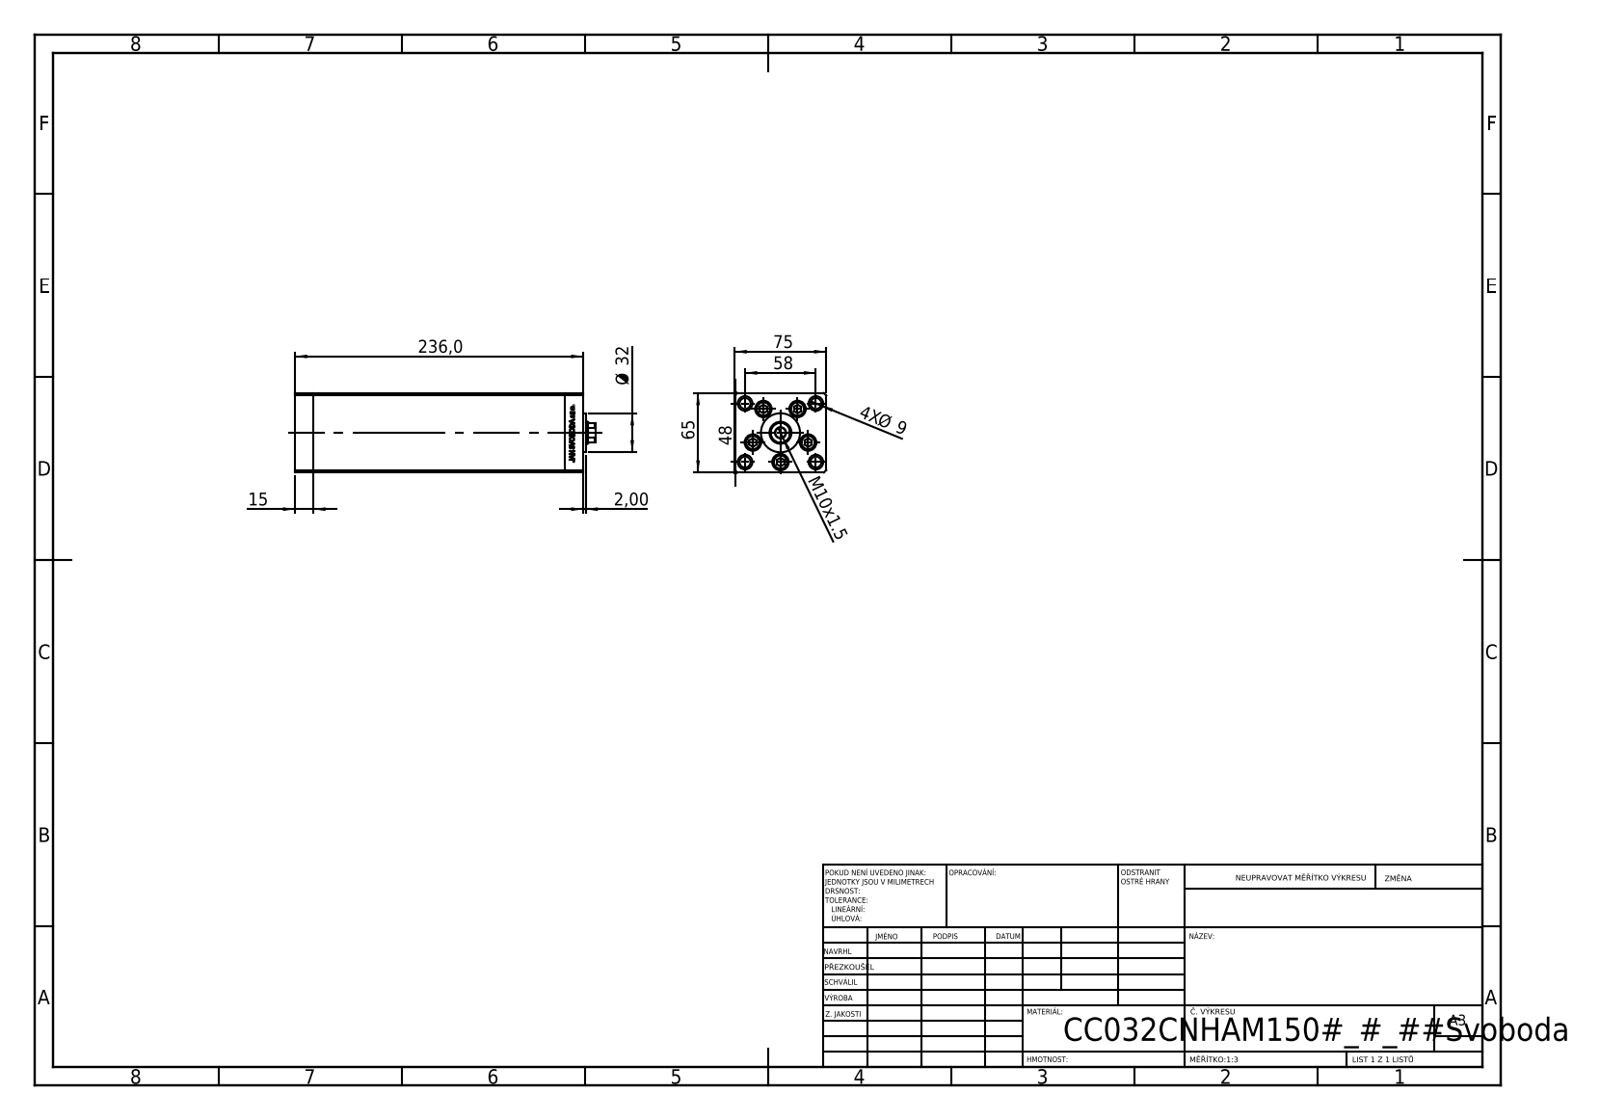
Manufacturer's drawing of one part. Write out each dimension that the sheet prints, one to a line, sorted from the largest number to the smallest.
236,0
75
65
58
48
Ø 32
15
M10x1.5
4X Ø 9
2,00
